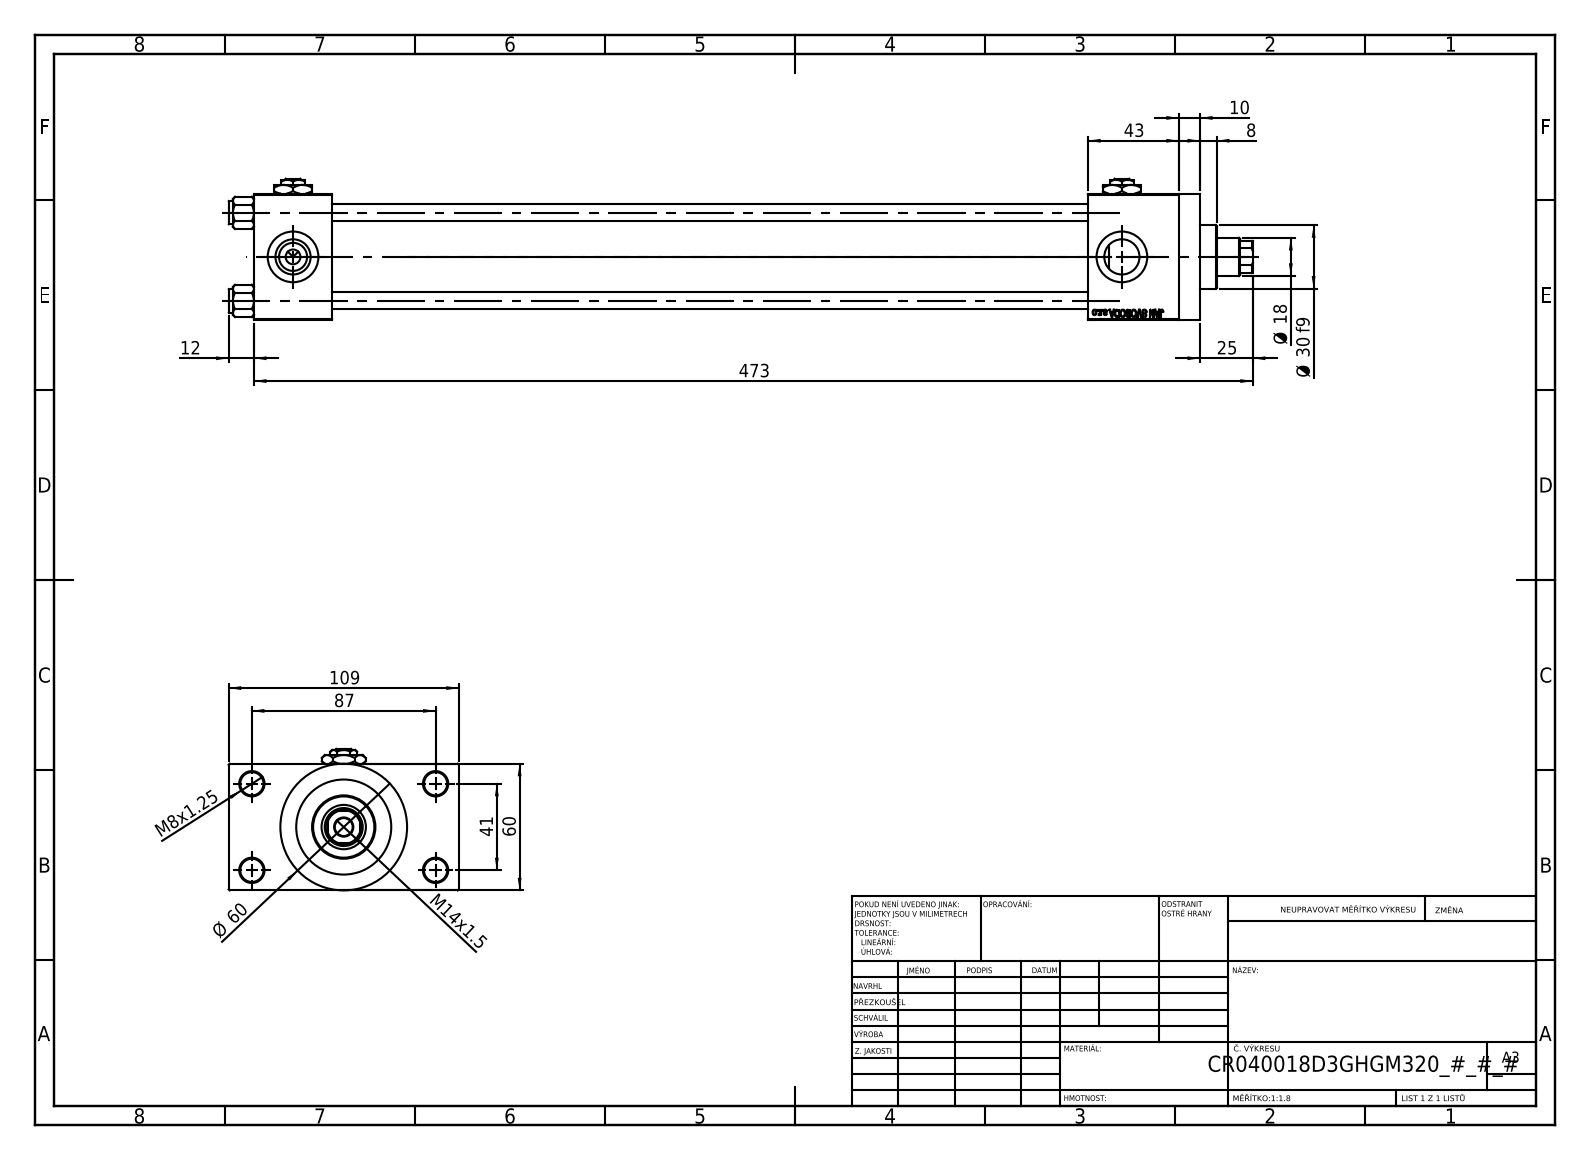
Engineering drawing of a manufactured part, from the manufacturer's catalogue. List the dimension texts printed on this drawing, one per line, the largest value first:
473
109
87
Ø 60
60
43
41
Ø 30 f9
25
Ø 18
M14x1.5
12
10
8
M8x1.25
